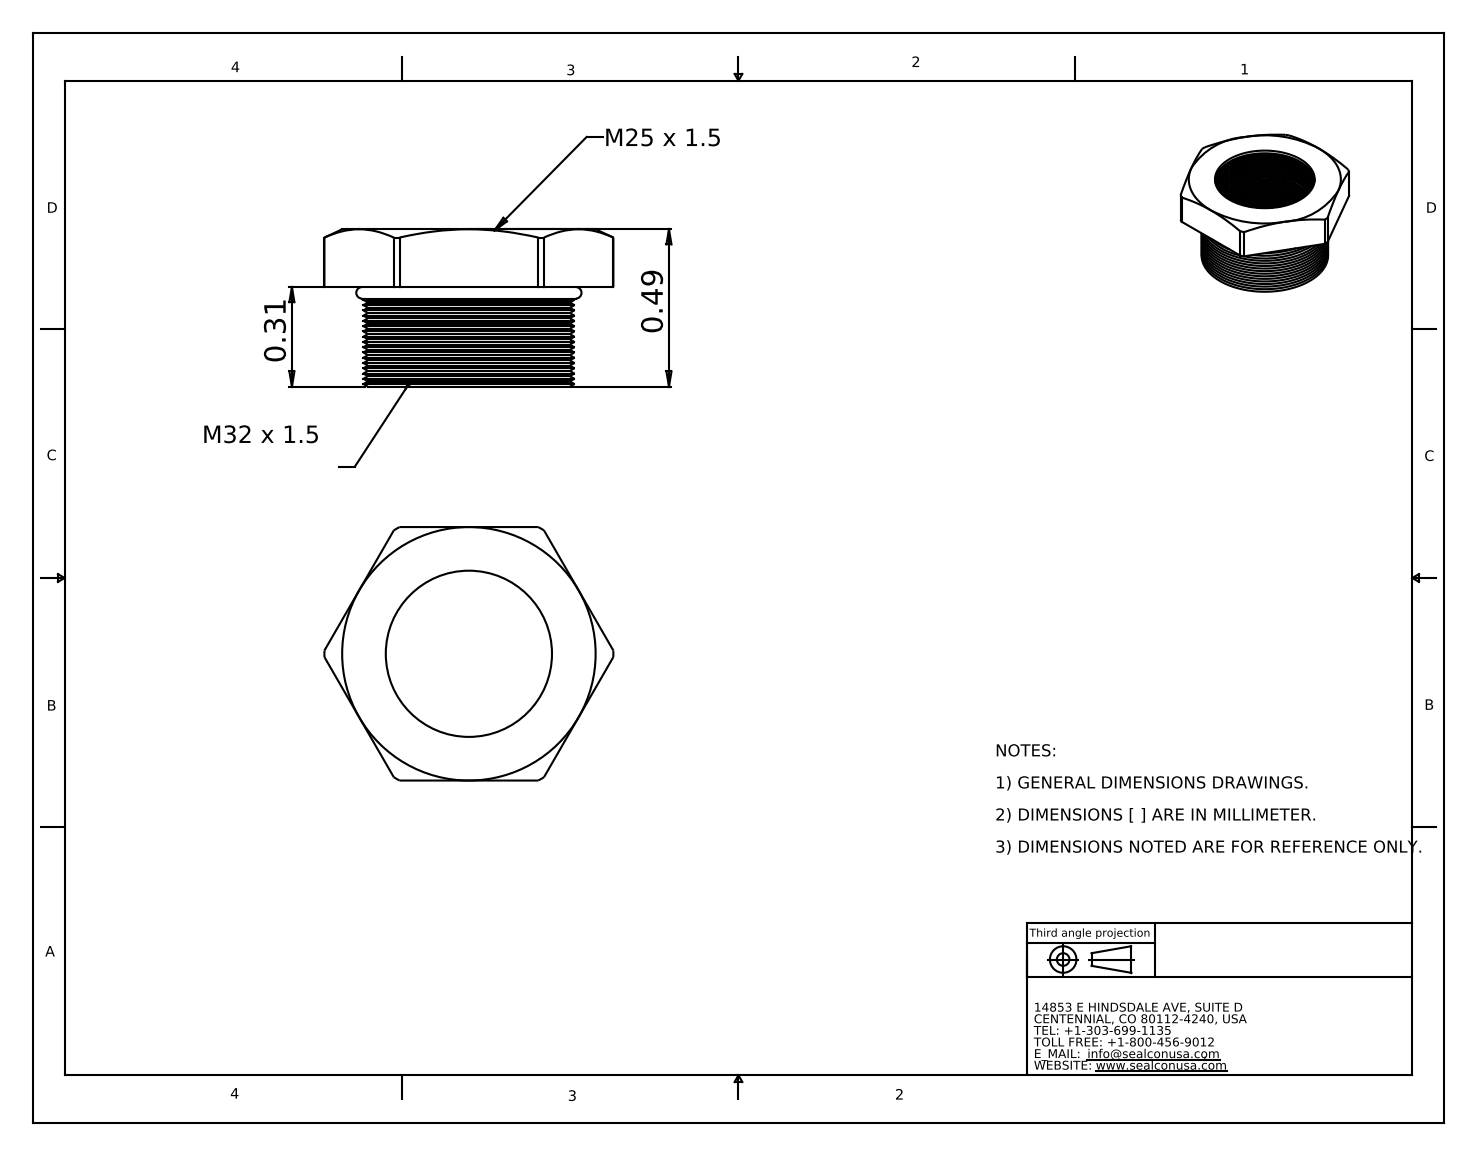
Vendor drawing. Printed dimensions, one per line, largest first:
0.49
0.31
